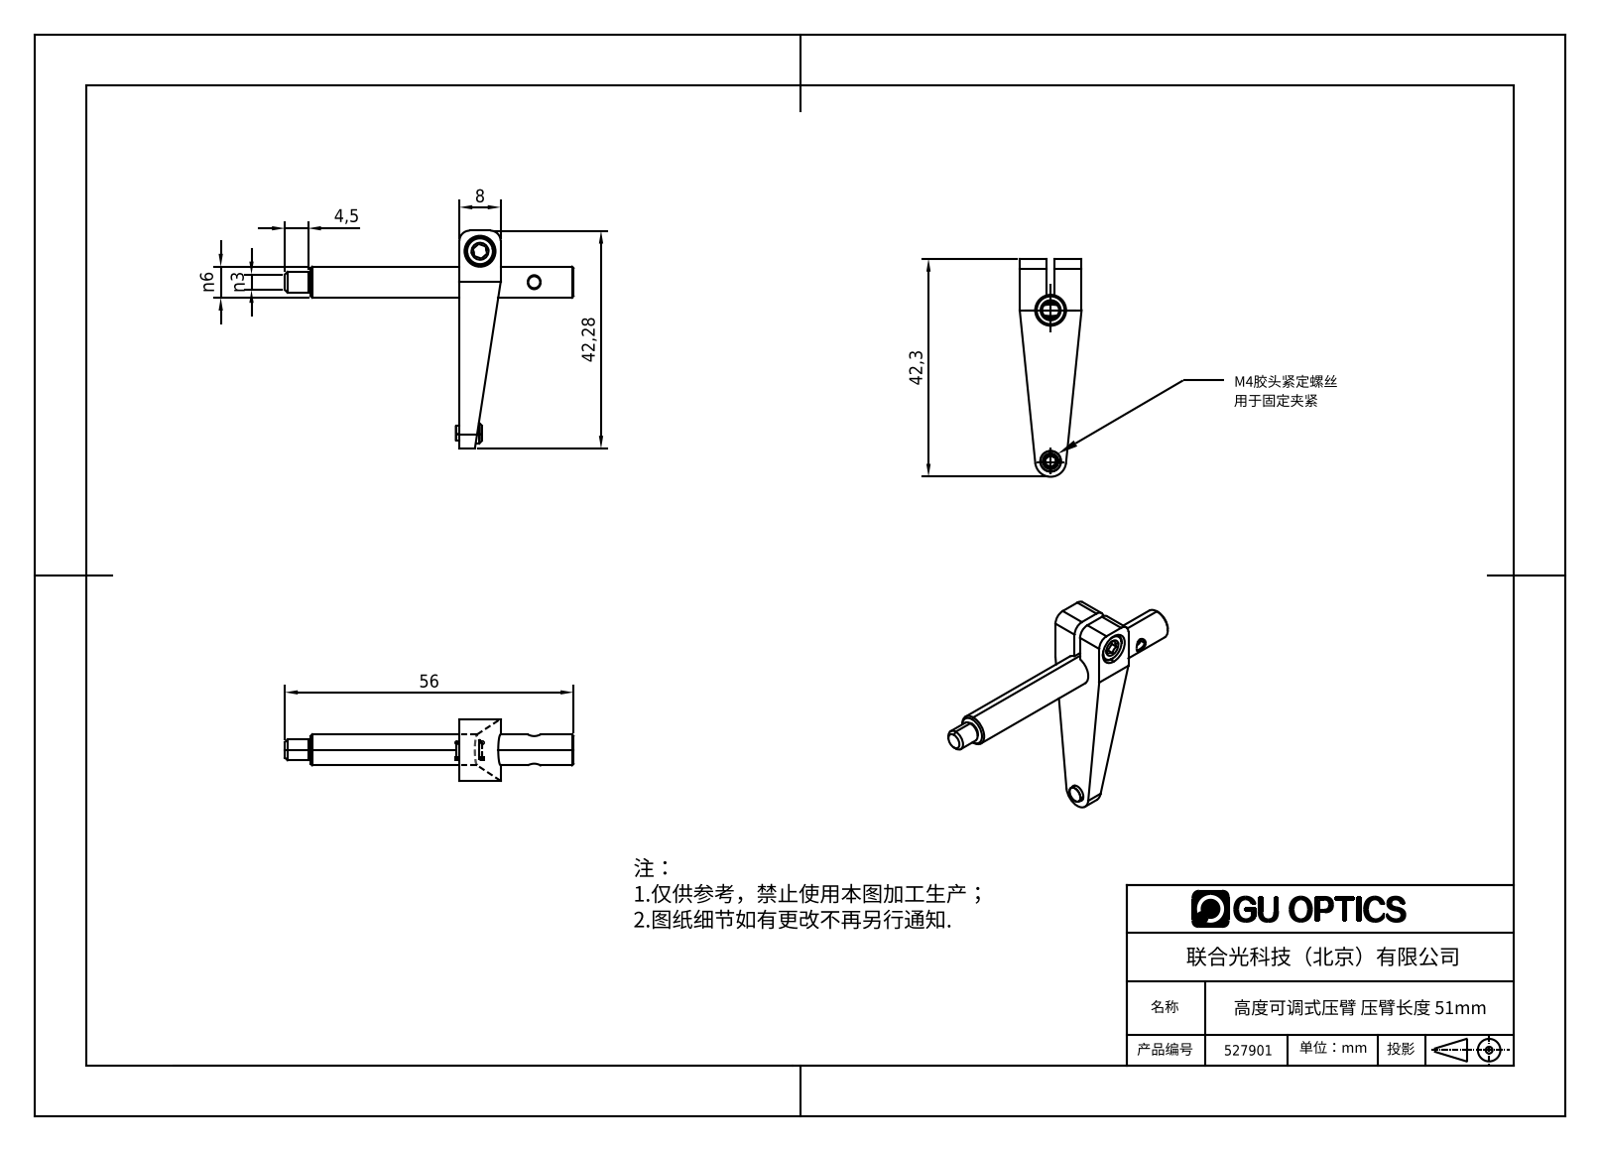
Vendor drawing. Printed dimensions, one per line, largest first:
56
42,3
42,28
8
n6
4,5
n3
